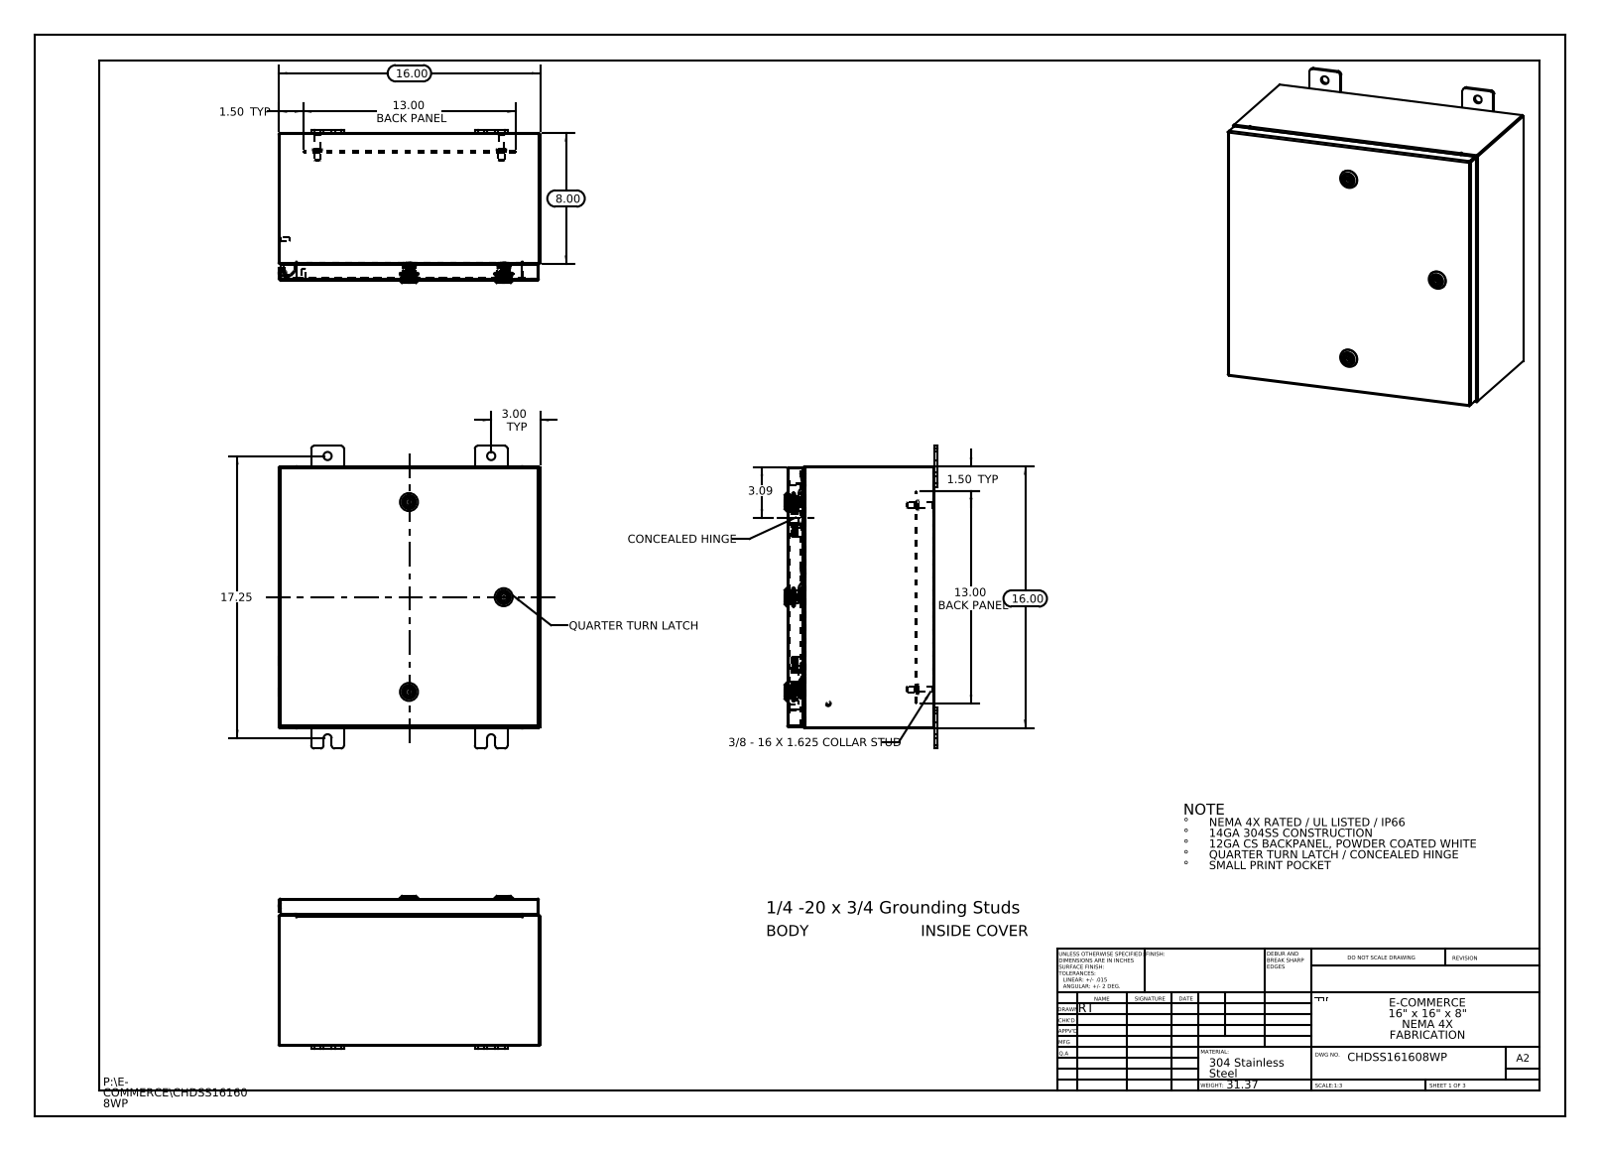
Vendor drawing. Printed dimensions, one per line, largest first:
17.25
16.00
16.00
13.00 BACK PANEL
13.00 BACK PANEL
8.00
3.09
3.00 TYP
1.50 TYP
1.50 TYP
